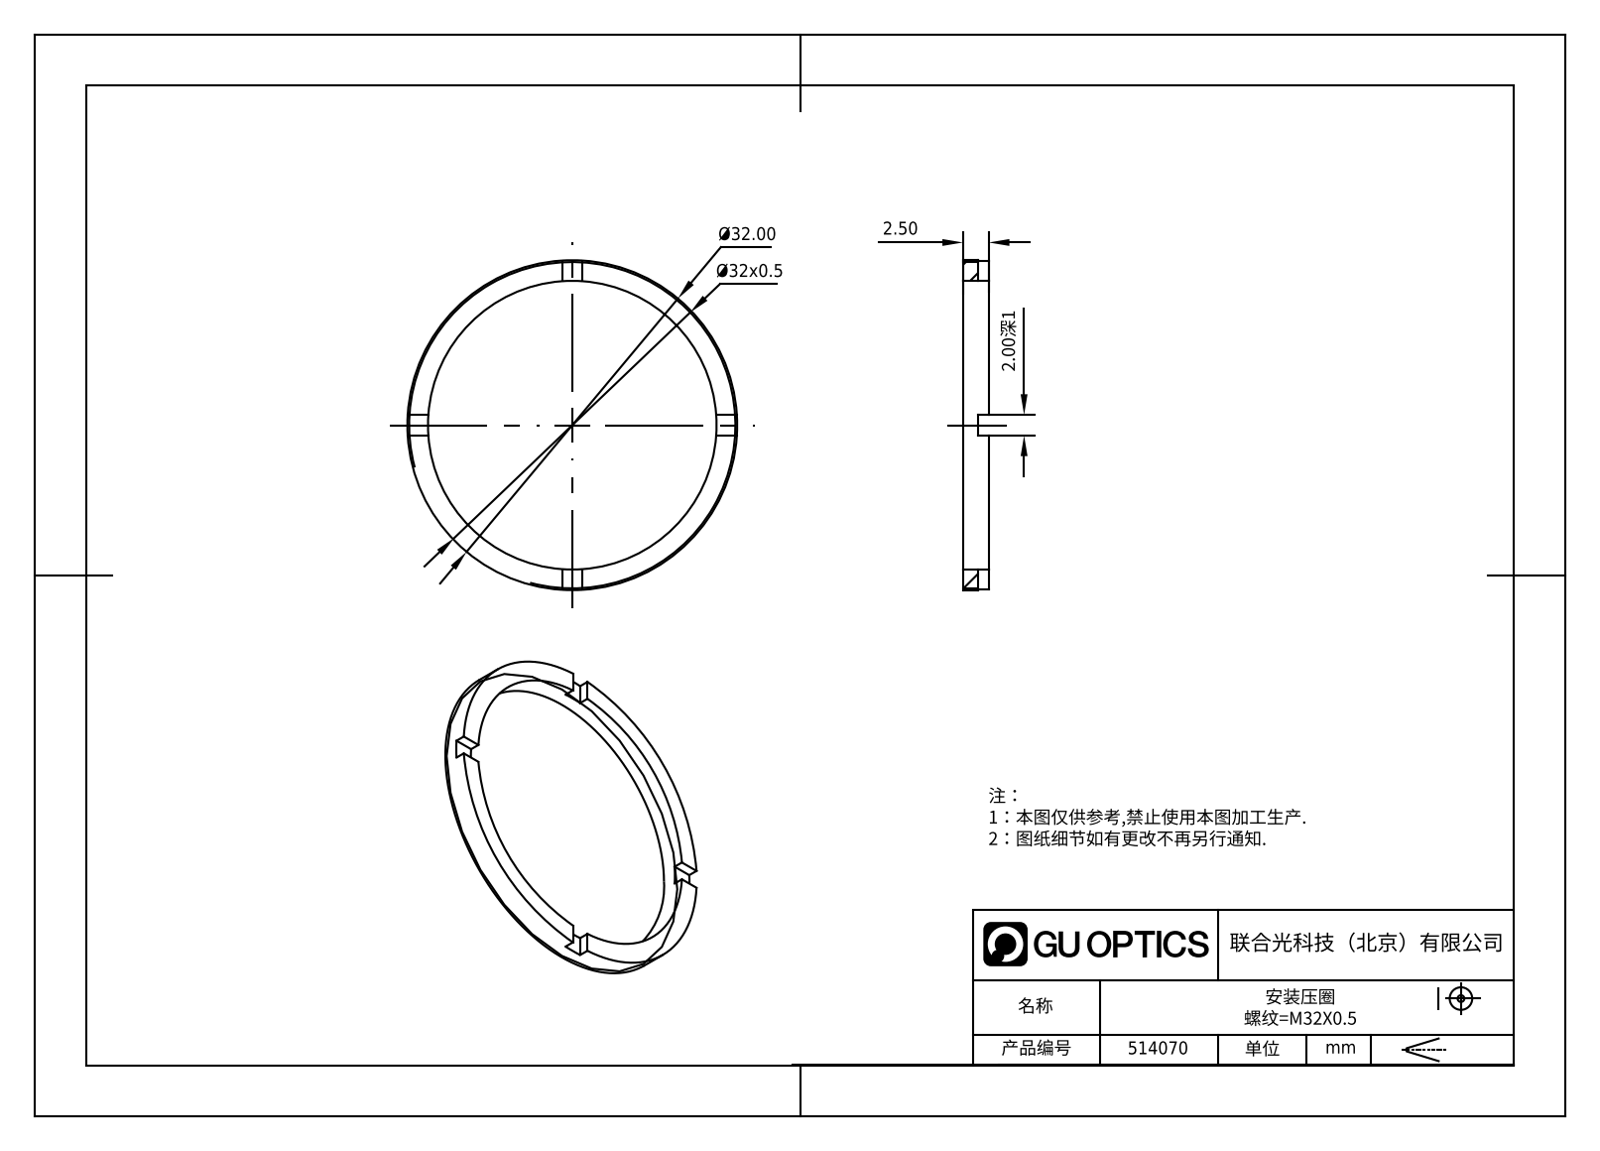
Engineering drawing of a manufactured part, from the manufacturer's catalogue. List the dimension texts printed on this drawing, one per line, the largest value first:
Ø32.00
Ø32x0.5
2.50
2.00深1
